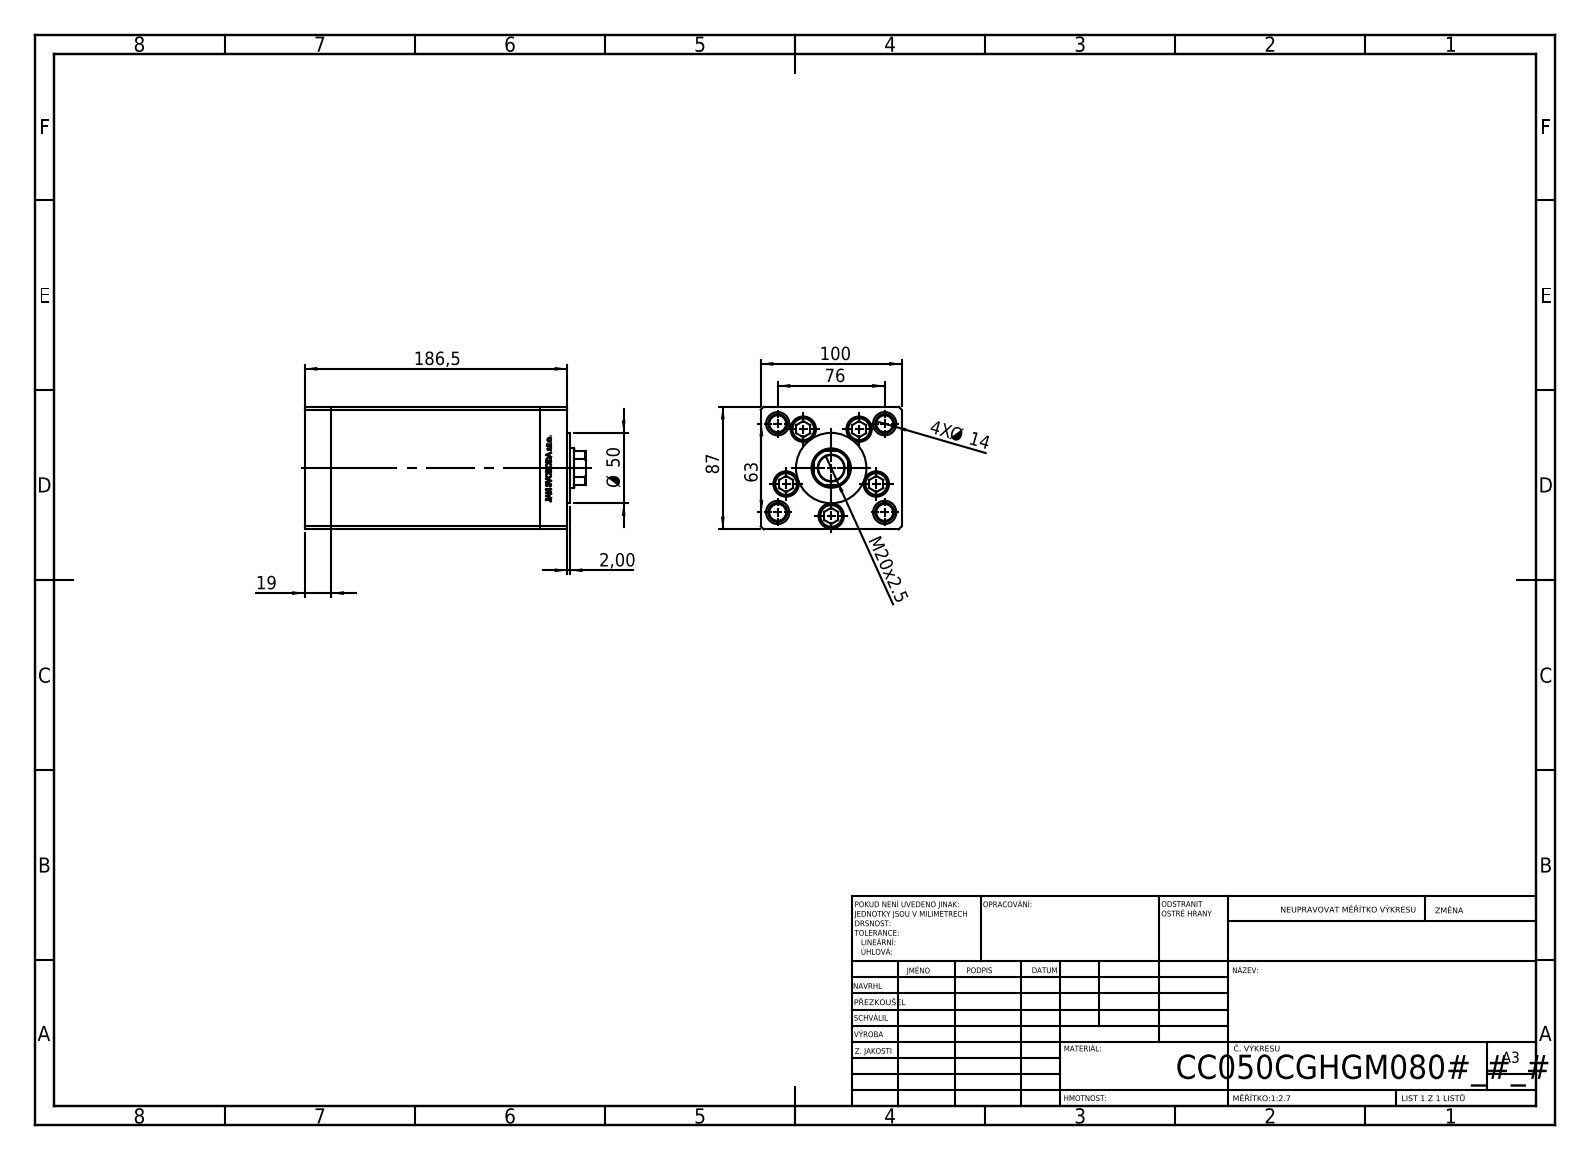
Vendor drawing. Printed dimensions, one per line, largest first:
186,5
100
87
76
63
Ø 50
M20x2.5
19
4X Ø 14
2,00
